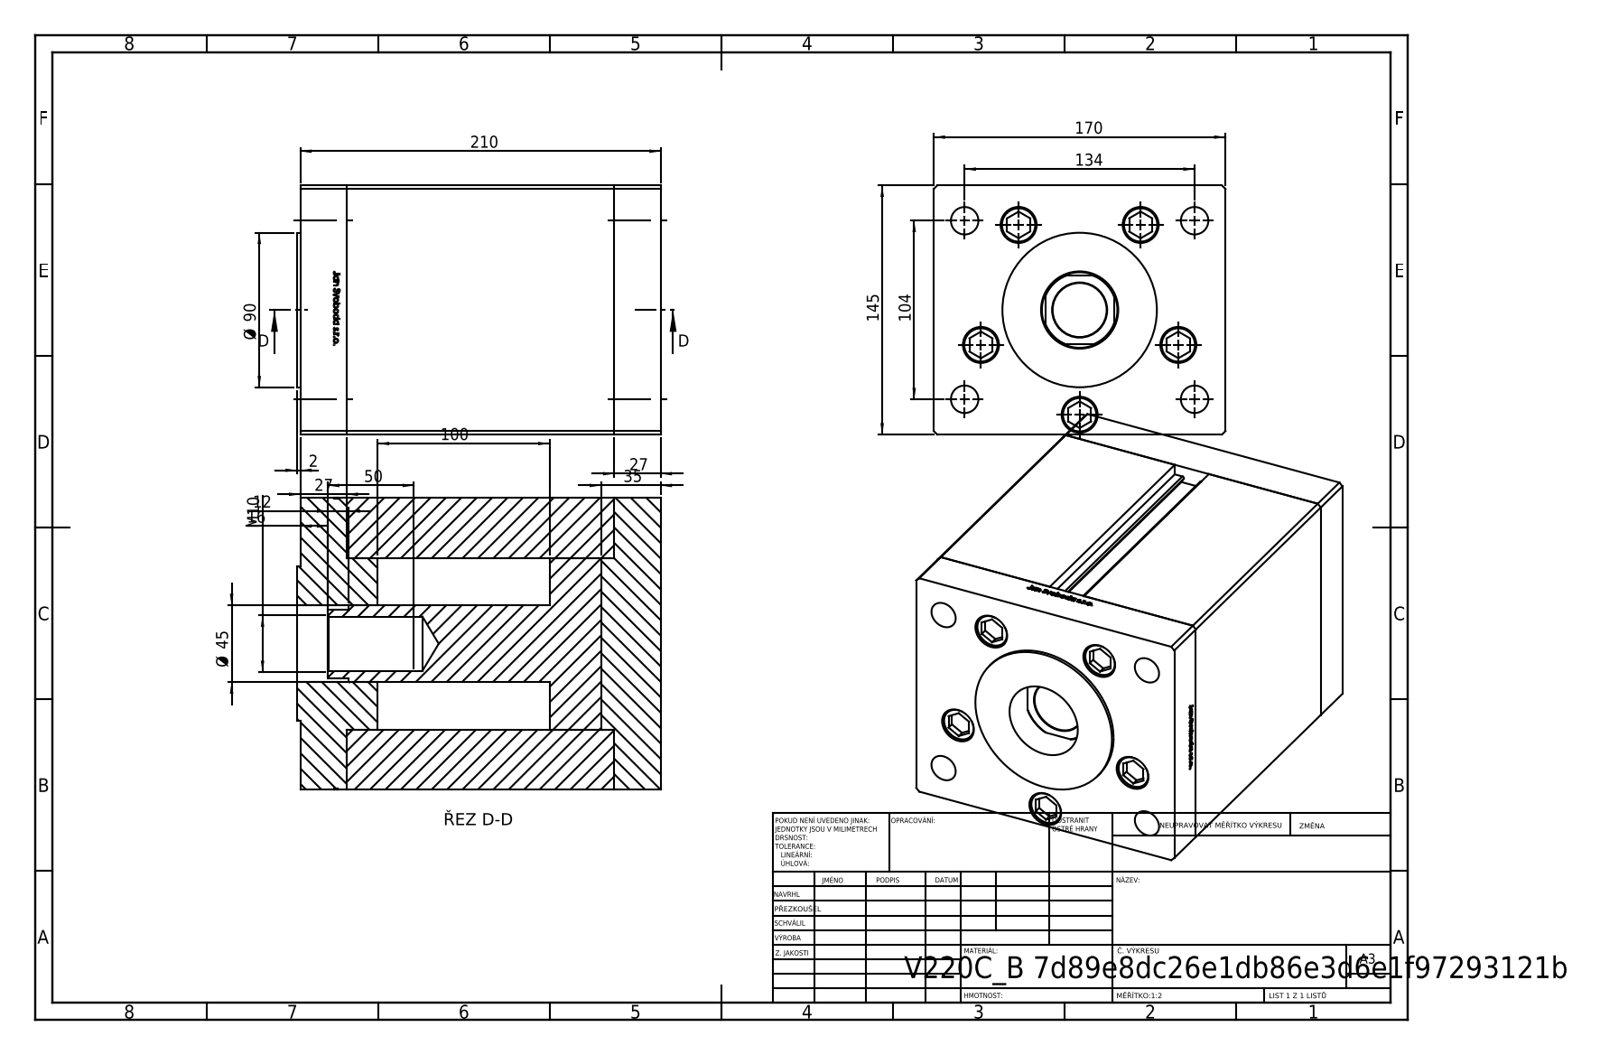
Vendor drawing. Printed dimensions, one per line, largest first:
210
170
145
134
104
100
Ø 90
50
Ø 45
35
27
27
16
12
M10
2
